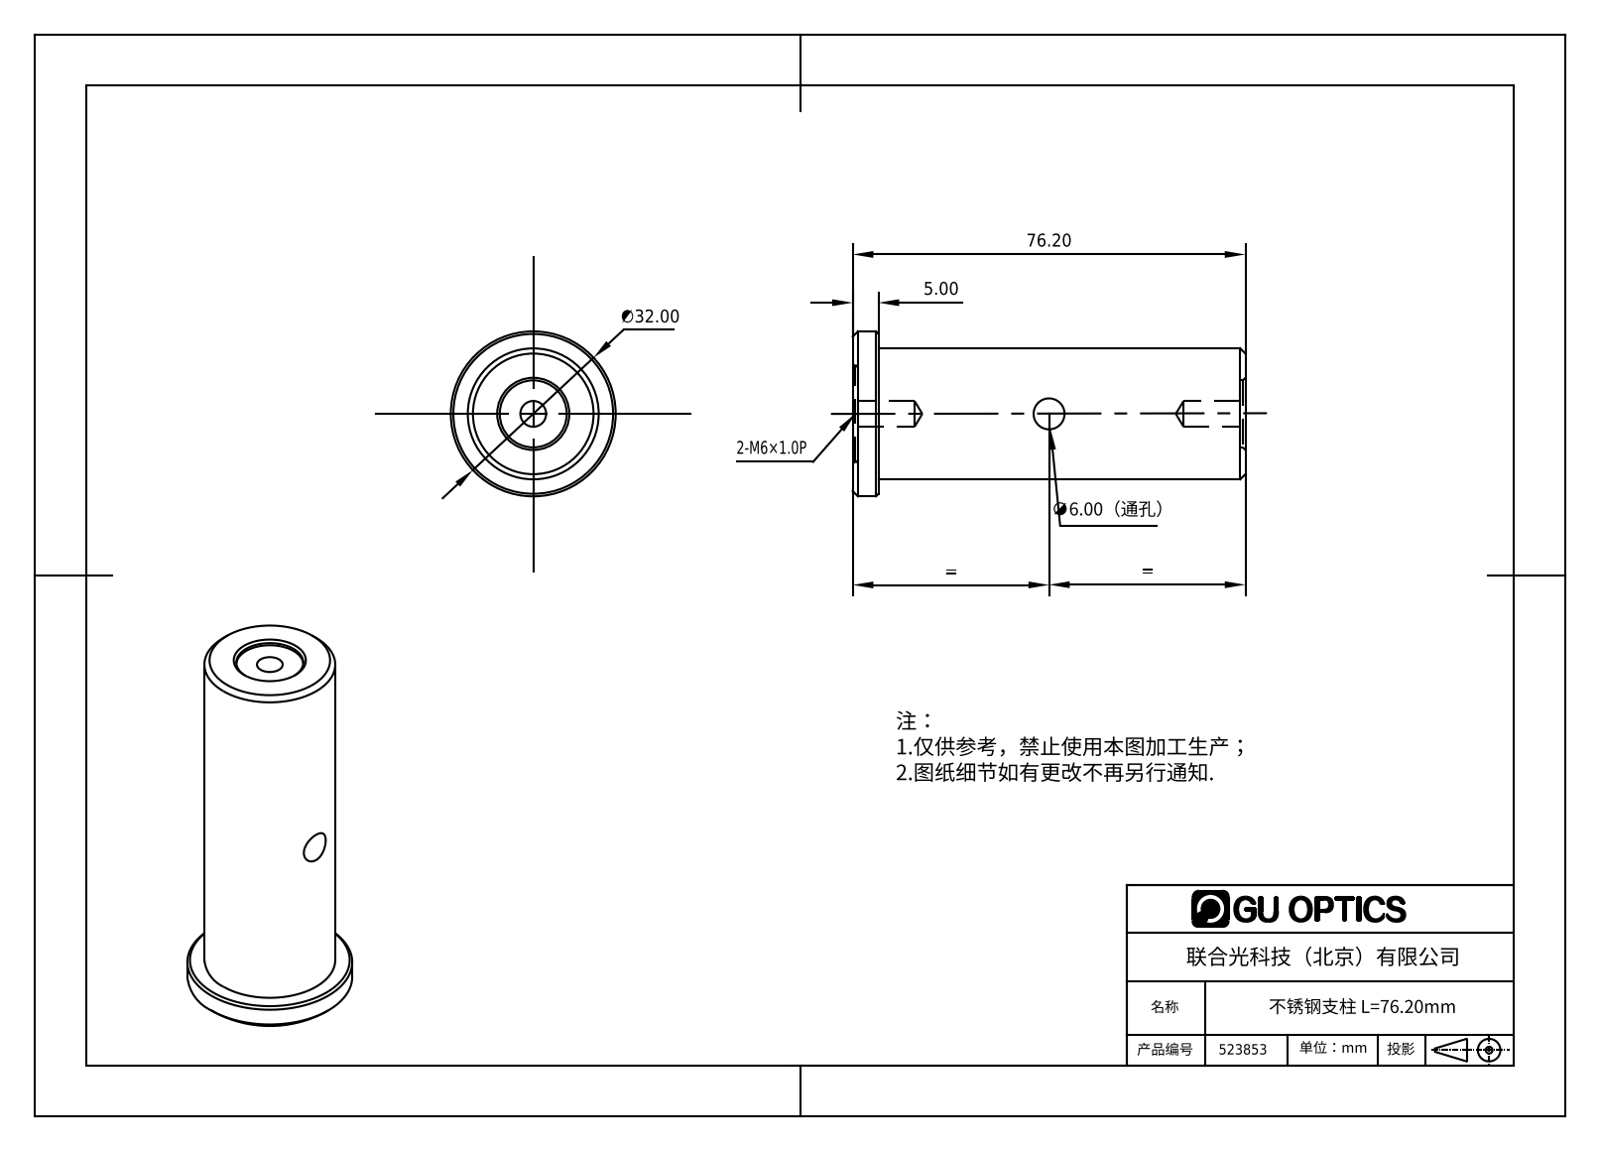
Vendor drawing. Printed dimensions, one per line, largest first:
76.20
∅32.00
∅6.00（通孔）
5.00
=
=
